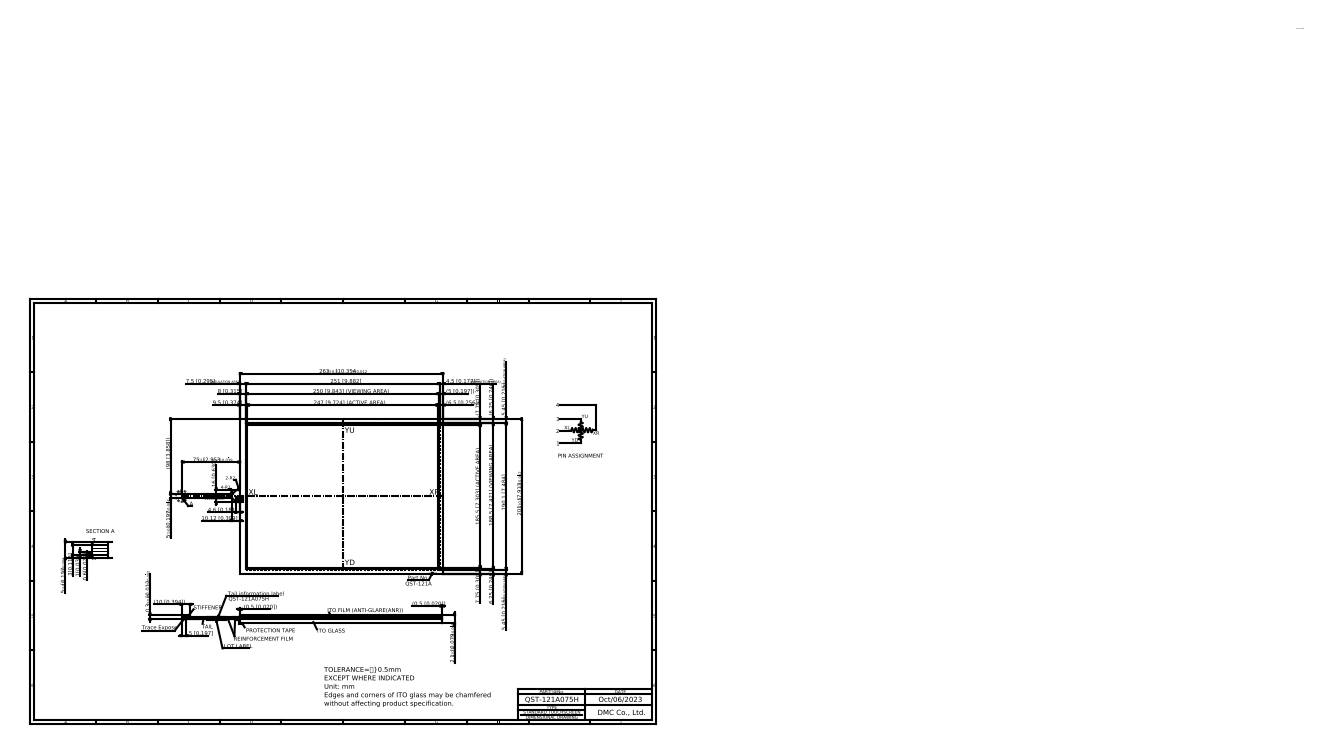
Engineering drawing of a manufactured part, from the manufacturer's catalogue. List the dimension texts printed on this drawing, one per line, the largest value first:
263.00
251 [9.882]
250 [9.843] (VIEWING AREA)
247 [9.724] (ACTIVE AREA)
201.00
190.1 [7.484]
188.5 [7.421] (VIEWING AREA)
185.5 [7.303] (ACTIVE AREA)
(98 [3.858])
75.00
16 [0.630]
10.12 [0.399]
(10 [0.394])
9.5 [0.374]
8 [0.315]
(7.75 [0.305])
7.75 [0.305]
7.50{\H0.6x;(INSULATION AREA)}
(6.5 [0.256])
(6.25 [0.246])
6.25 [0.246]
5.45{\H0.5938x;(INSULATION AREA)}
5.45{\H0.5938x;(INSULATION AREA)}
(5 [0.197])
5.00
5 [0.197]
5{\H0.6667x;?}0.1}[0.197{\H0.6667x;?}0.004}]
4.6 [0.181]
4.50{\H0.5938x;(INSULATION AREA)}
3[0.118]
2.1{\H0.6563x;?}0.2}[0.079{\H0.6563x;?}0.008}]
1[0.039]
0.6[0.024]
(0.5 [0.020])
(0.5 [0.020])
0.3{\H0.6563x;?}0.05}[0.012{\H0.6563x;?}0.002}]
